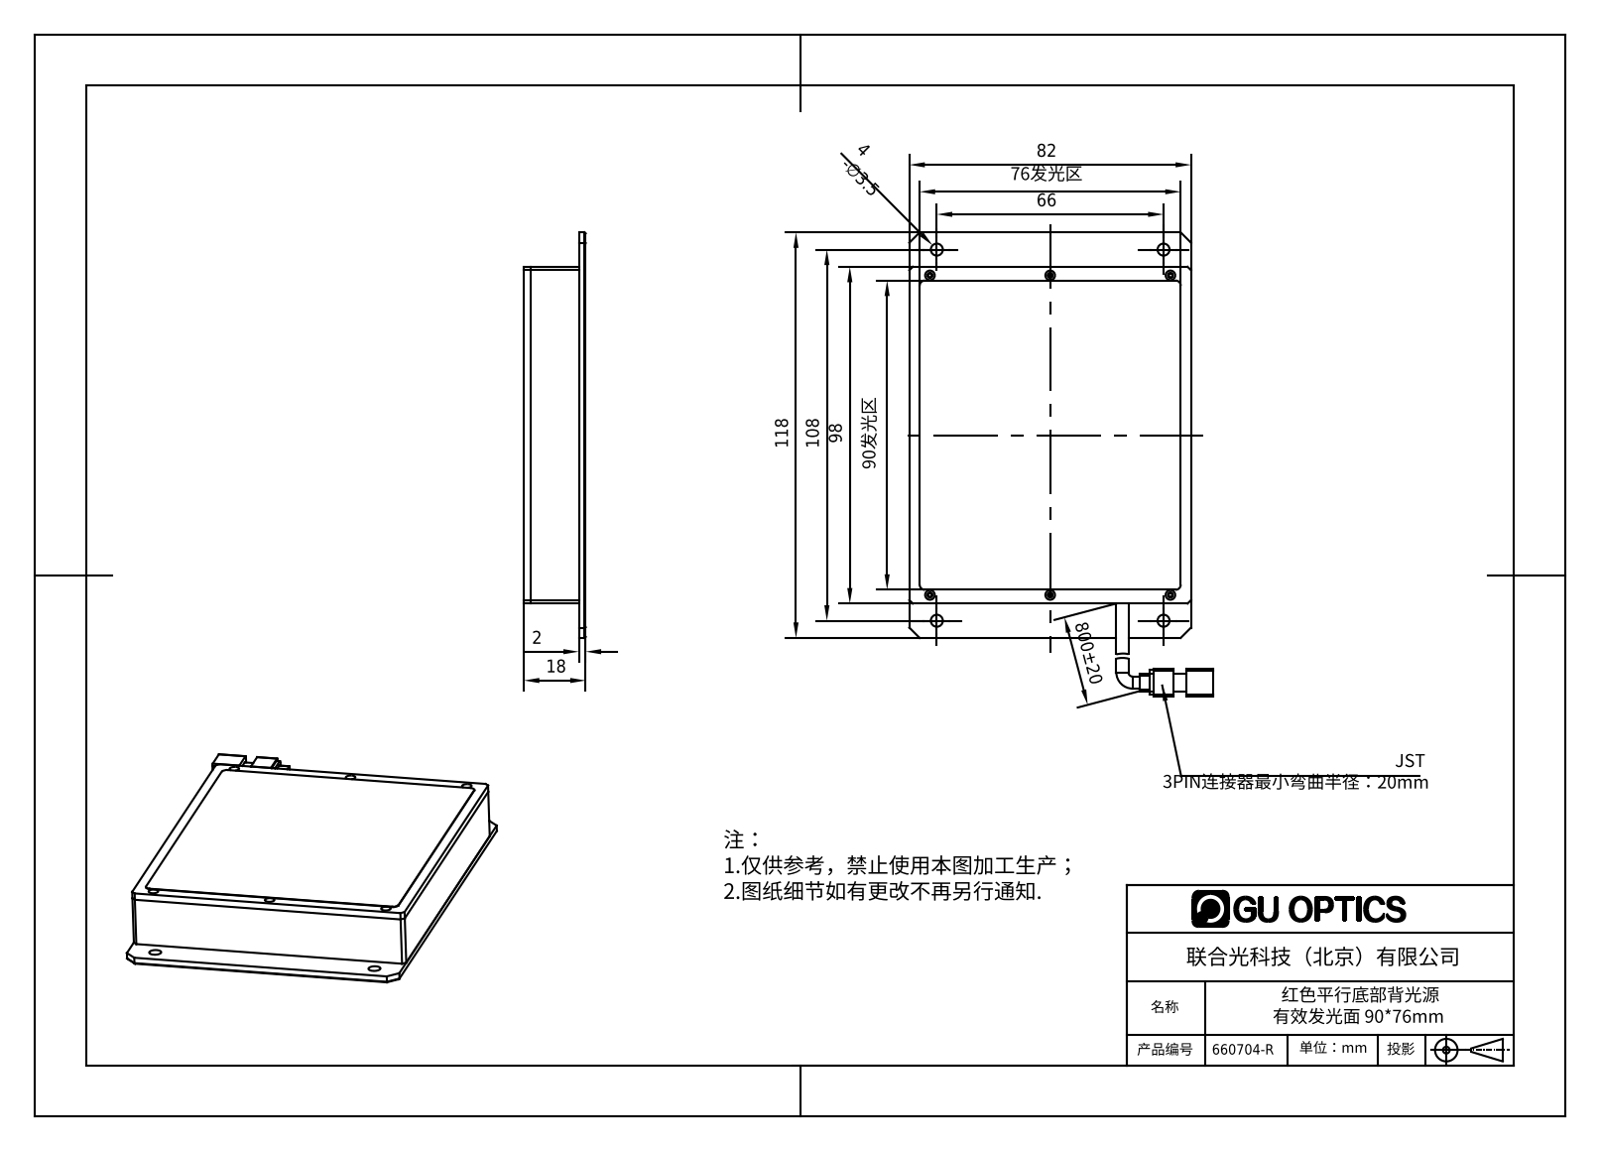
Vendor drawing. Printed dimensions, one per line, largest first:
800±20
118
108
98
90发光区
82
76发光区
66
18
4 -∅3.5
2
